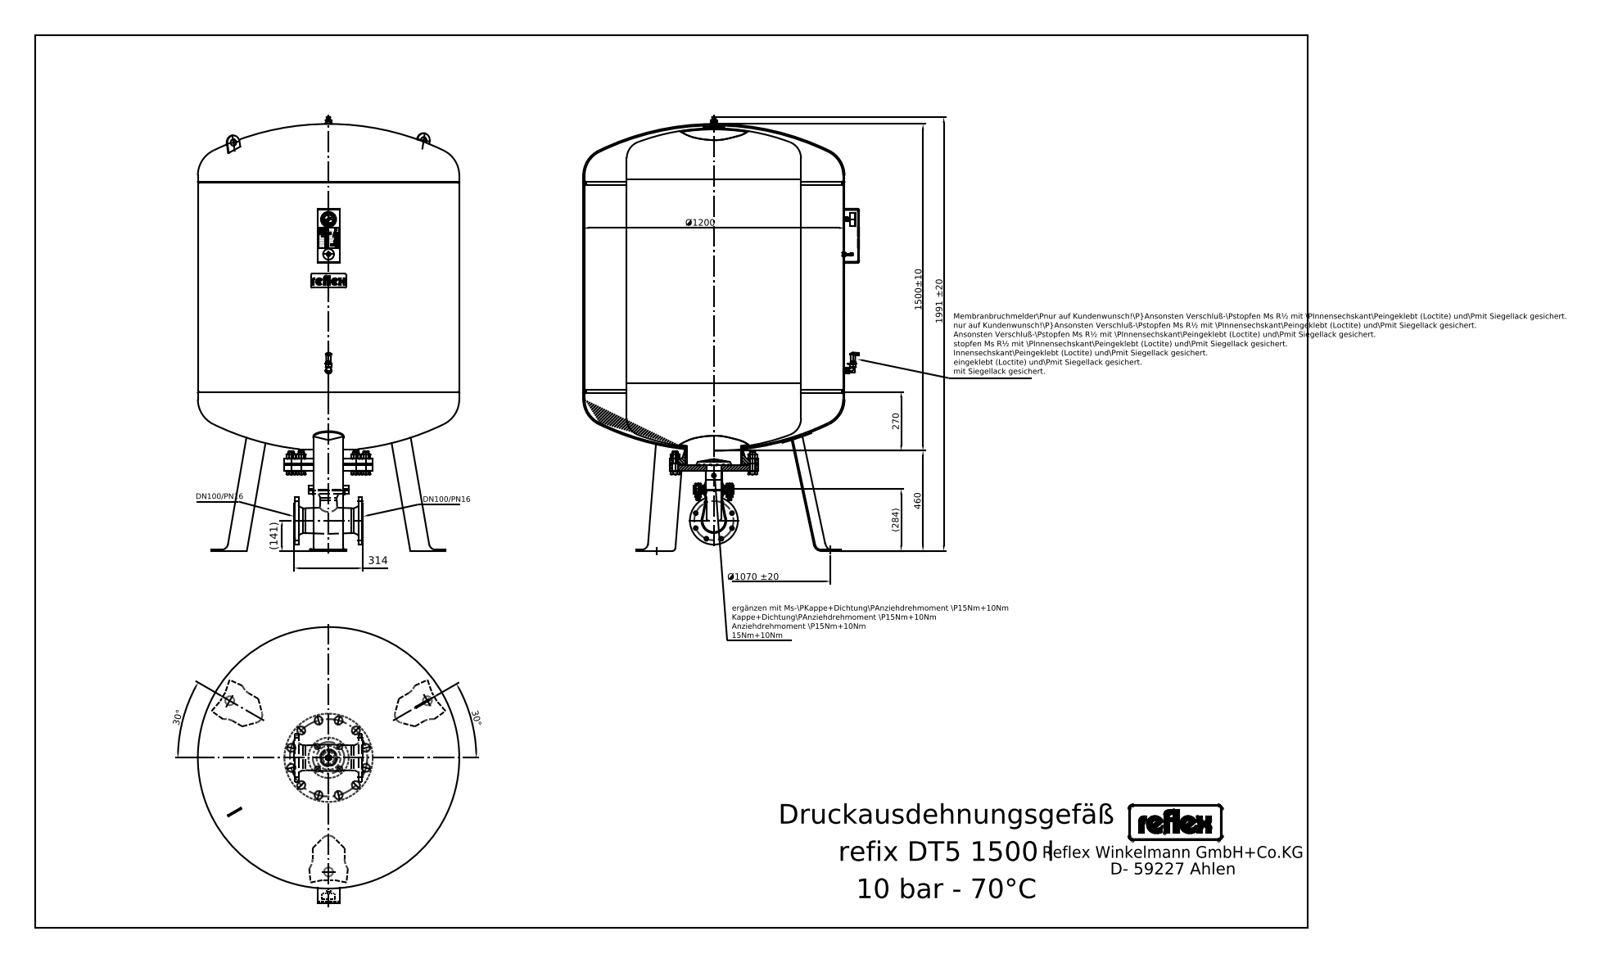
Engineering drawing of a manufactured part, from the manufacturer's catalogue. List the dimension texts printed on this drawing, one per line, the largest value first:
1991 ±20
1500±10
Ø1200
Ø1070 ±20
460
314
(284)
270
(141)
30°
30°
